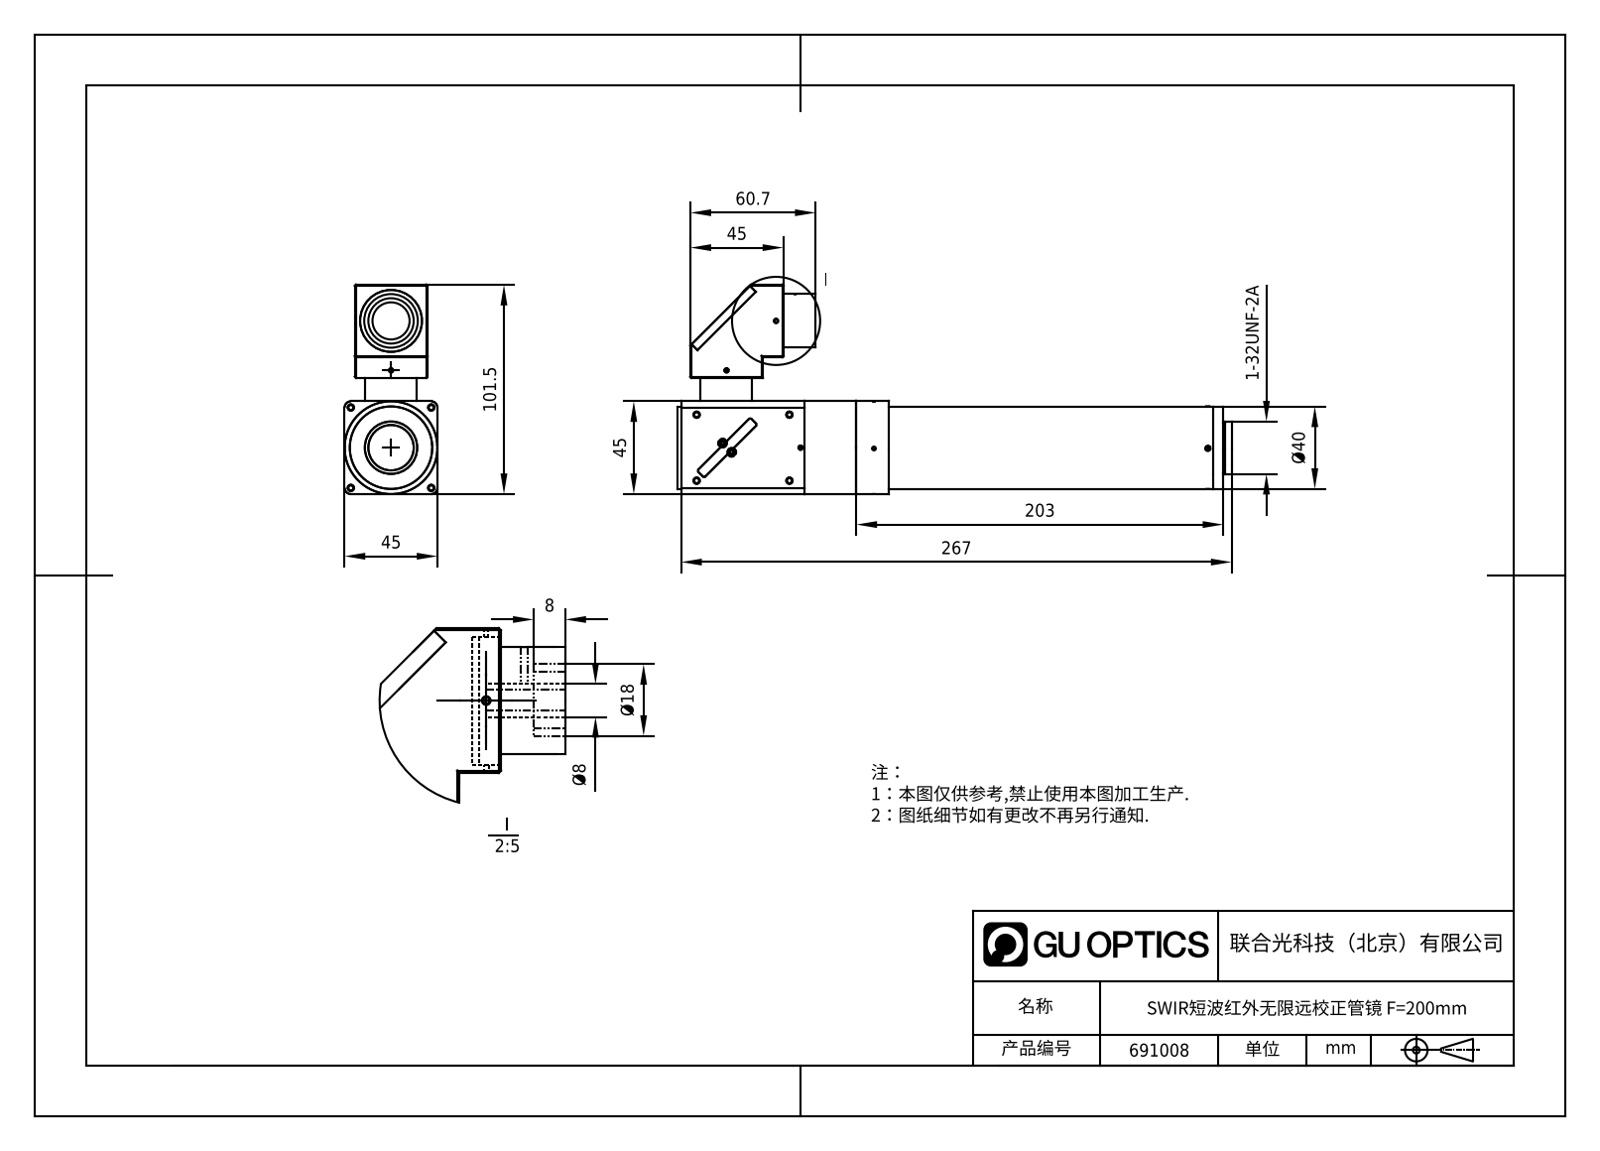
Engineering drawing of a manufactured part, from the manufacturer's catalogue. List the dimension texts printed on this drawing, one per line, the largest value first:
267
203
101.5
60.7
45
45
45
Ø40
Ø18
Ø8
8
1-32UNF-2A
